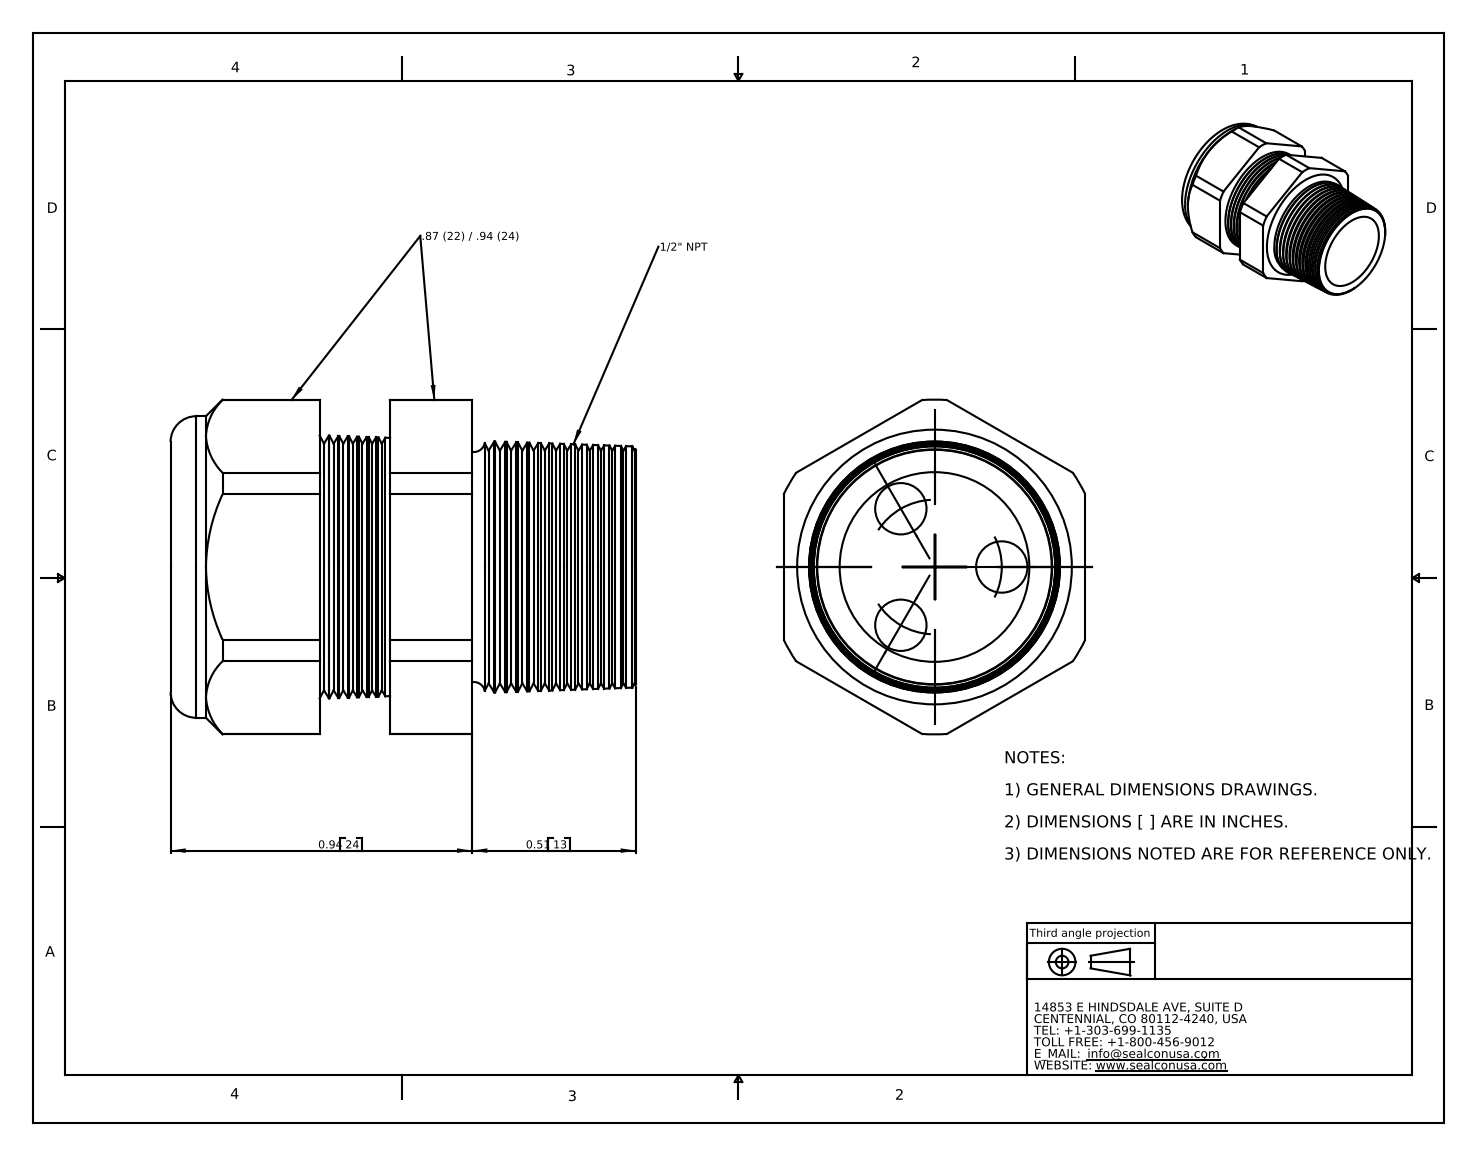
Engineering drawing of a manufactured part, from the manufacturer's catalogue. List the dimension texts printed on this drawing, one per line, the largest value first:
0.94 24
0.51 13
